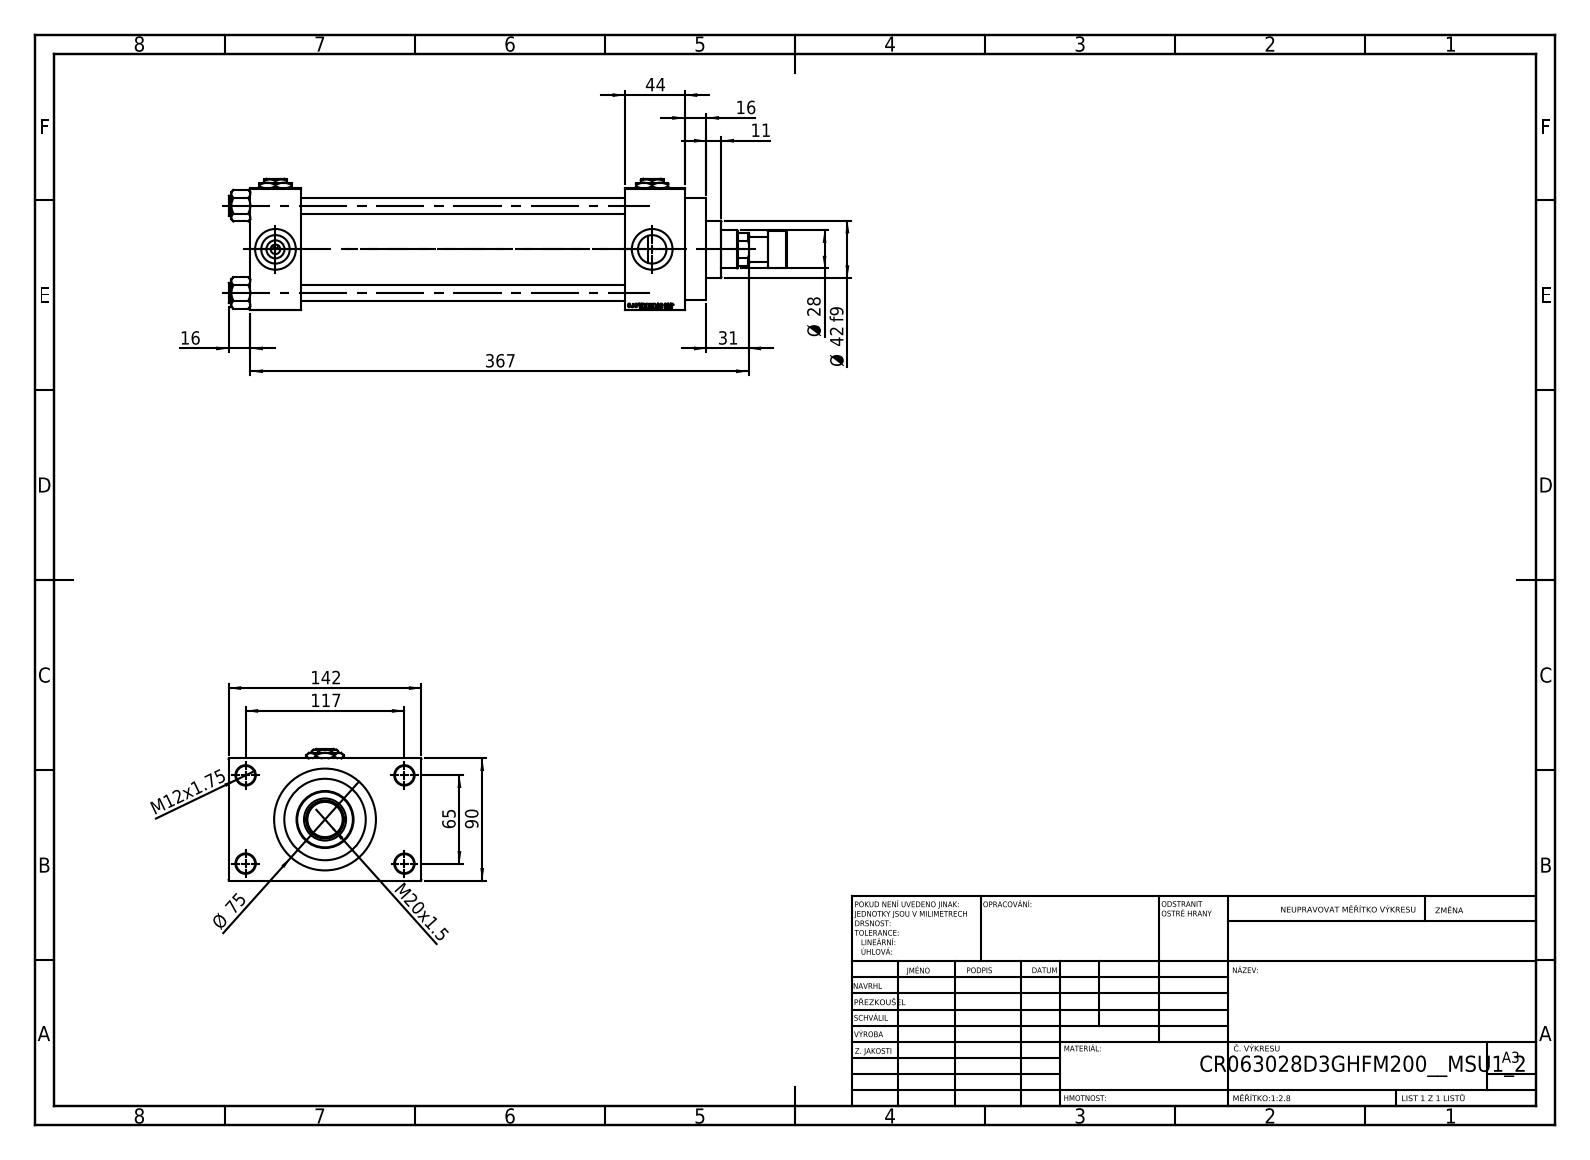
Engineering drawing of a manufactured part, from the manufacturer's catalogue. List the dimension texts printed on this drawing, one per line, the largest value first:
367
142
117
90
Ø 75
65
44
Ø 42 f9
31
Ø 28
M20x1.5
16
16
M12x1.75
11
